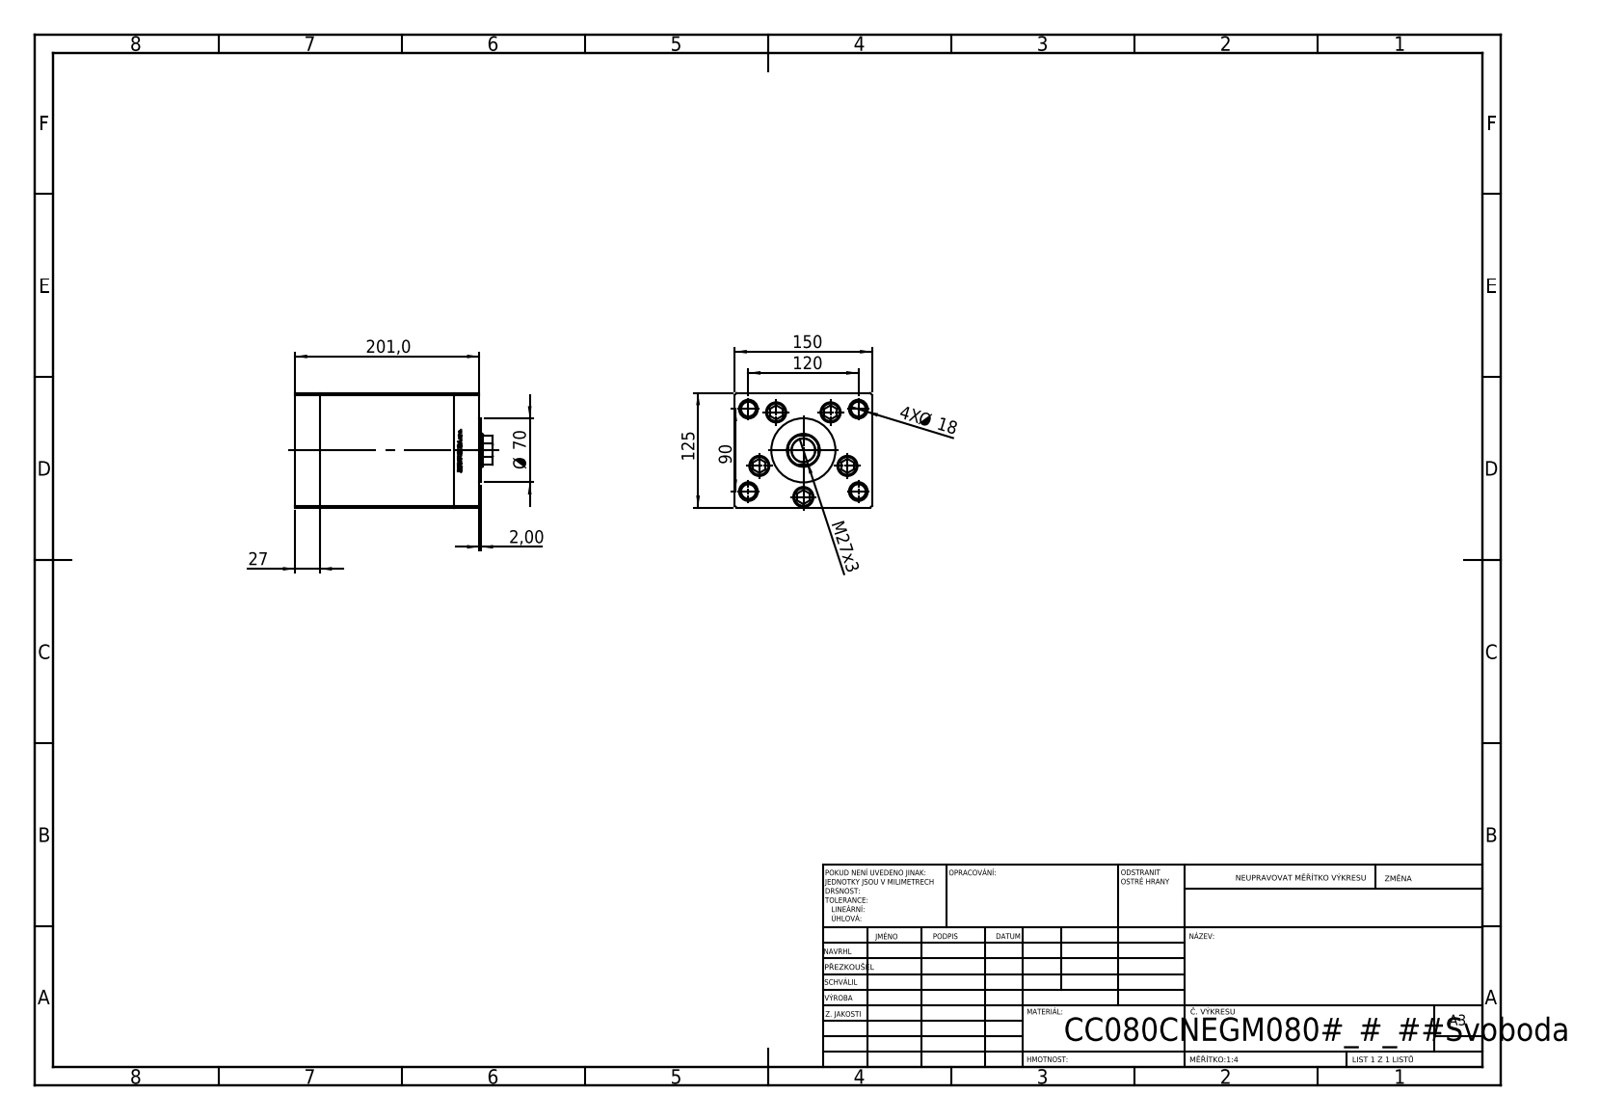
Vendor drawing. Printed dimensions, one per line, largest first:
201,0
150
125
120
90
Ø 70
27
M27x3
4X Ø 18
2,00
